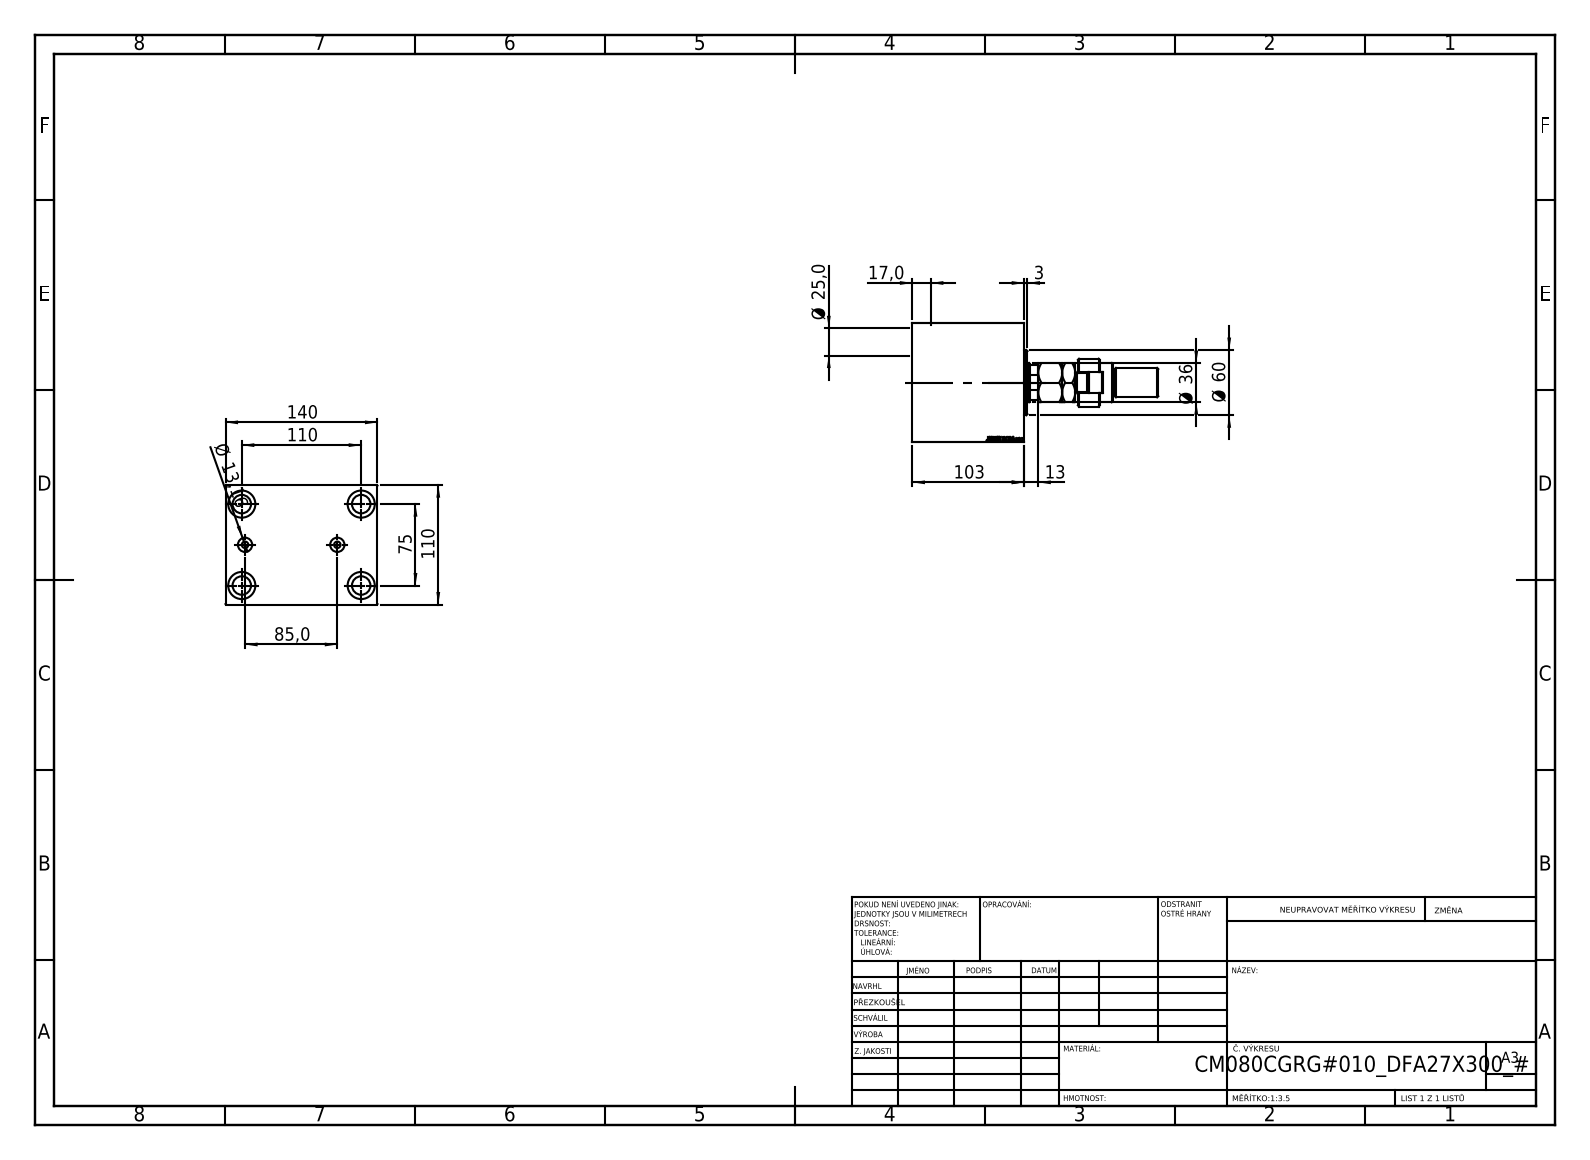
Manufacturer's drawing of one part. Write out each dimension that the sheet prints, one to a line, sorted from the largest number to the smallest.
140
110
110
103
85,0
75
Ø 60
Ø 36
Ø 25,0
17,0
Ø 13,16
13
3
